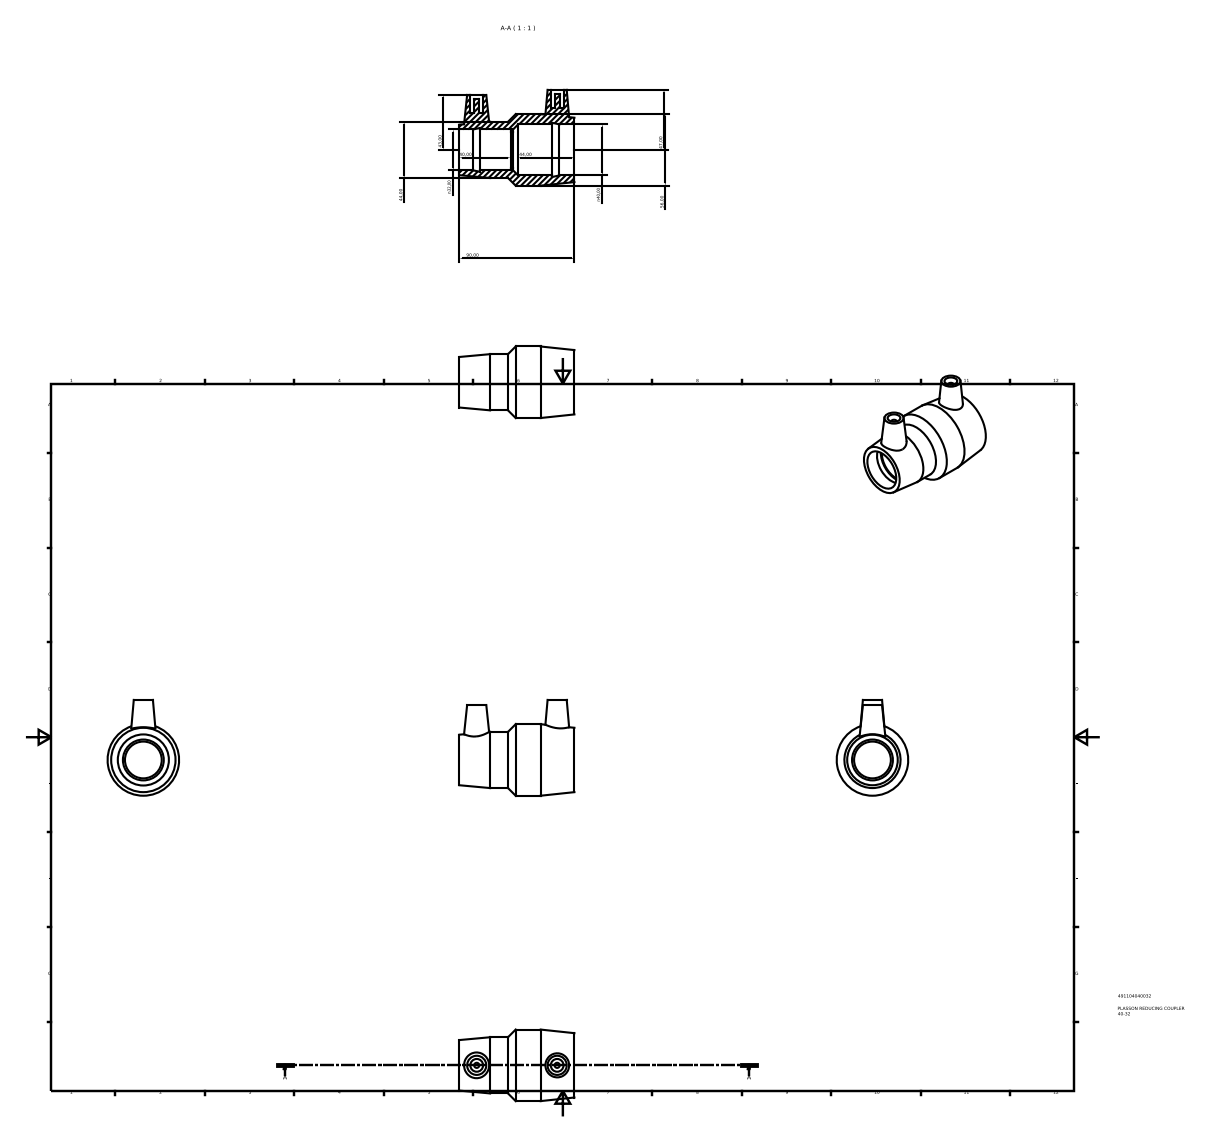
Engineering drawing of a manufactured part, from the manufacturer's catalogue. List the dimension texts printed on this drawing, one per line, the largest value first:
90,00
56,00
47,00
44,00
44,00
43,00
n40,00
40,00
n32,00
